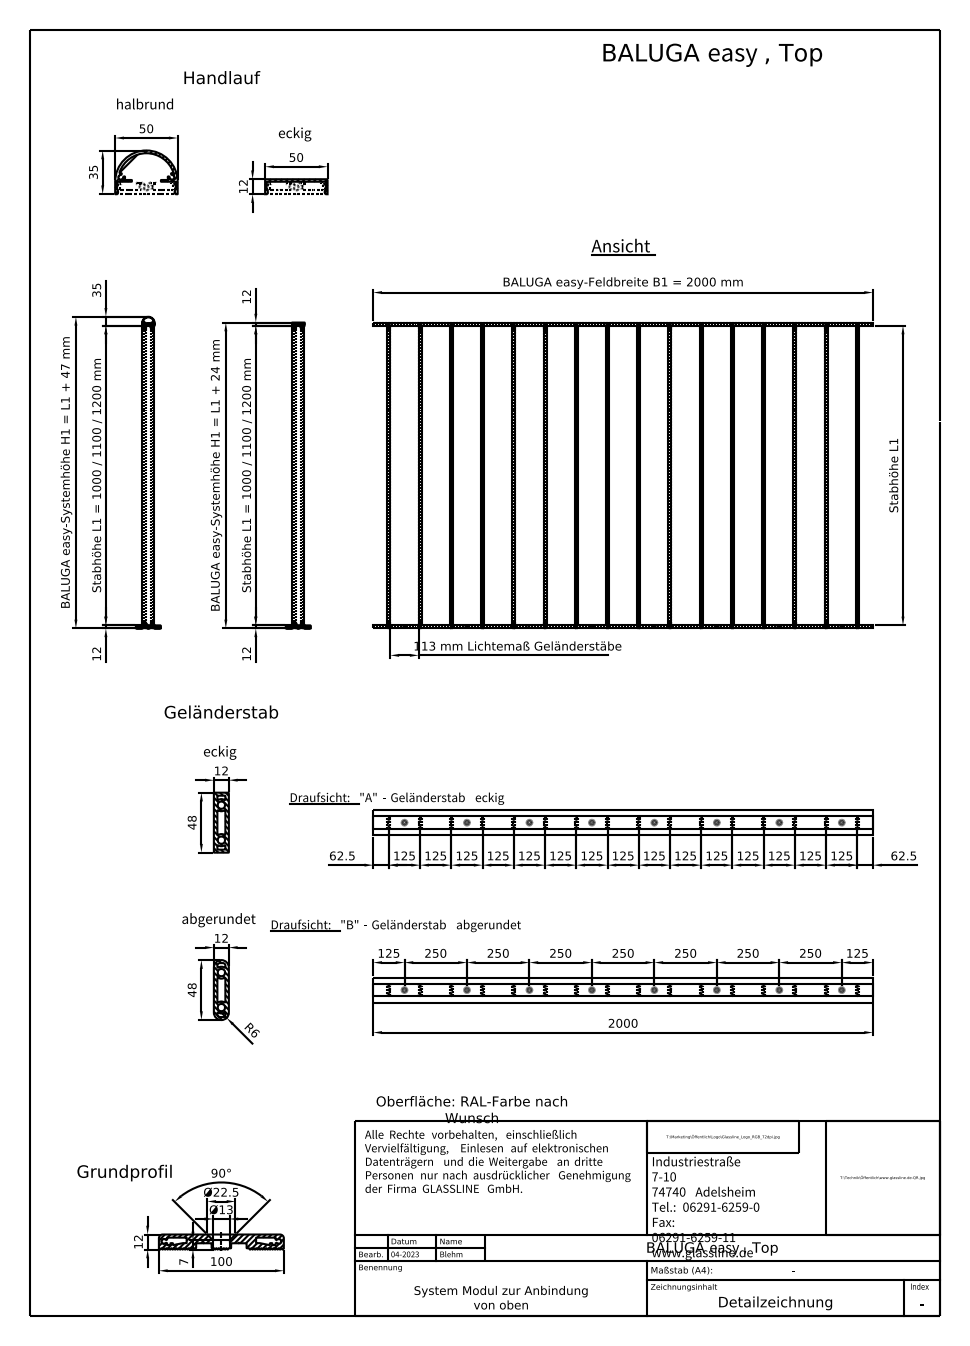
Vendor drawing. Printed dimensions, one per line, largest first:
2000
250
250
250
250
250
250
250
125
125
125
125
125
125
125
125
125
125
125
125
125
125
125
125
125
113 mm Lichtemaß Geländerstäbe
100
90°
62.5
62.5
50
50
48
48
35
35
Ø22.5
Ø13
12
12
12
12
12
12
12
7
R6
BALUGA easy-Feldbreite B1 = 2000 mm
Stabhöhe L1
Stabhöhe L1 = 1000 / 1100 / 1200 mm
BALUGA easy-Systemhöhe H1 = L1 + 24 mm
Stabhöhe L1 = 1000 / 1100 / 1200 mm
BALUGA easy-Systemhöhe H1 = L1 + 47 mm
